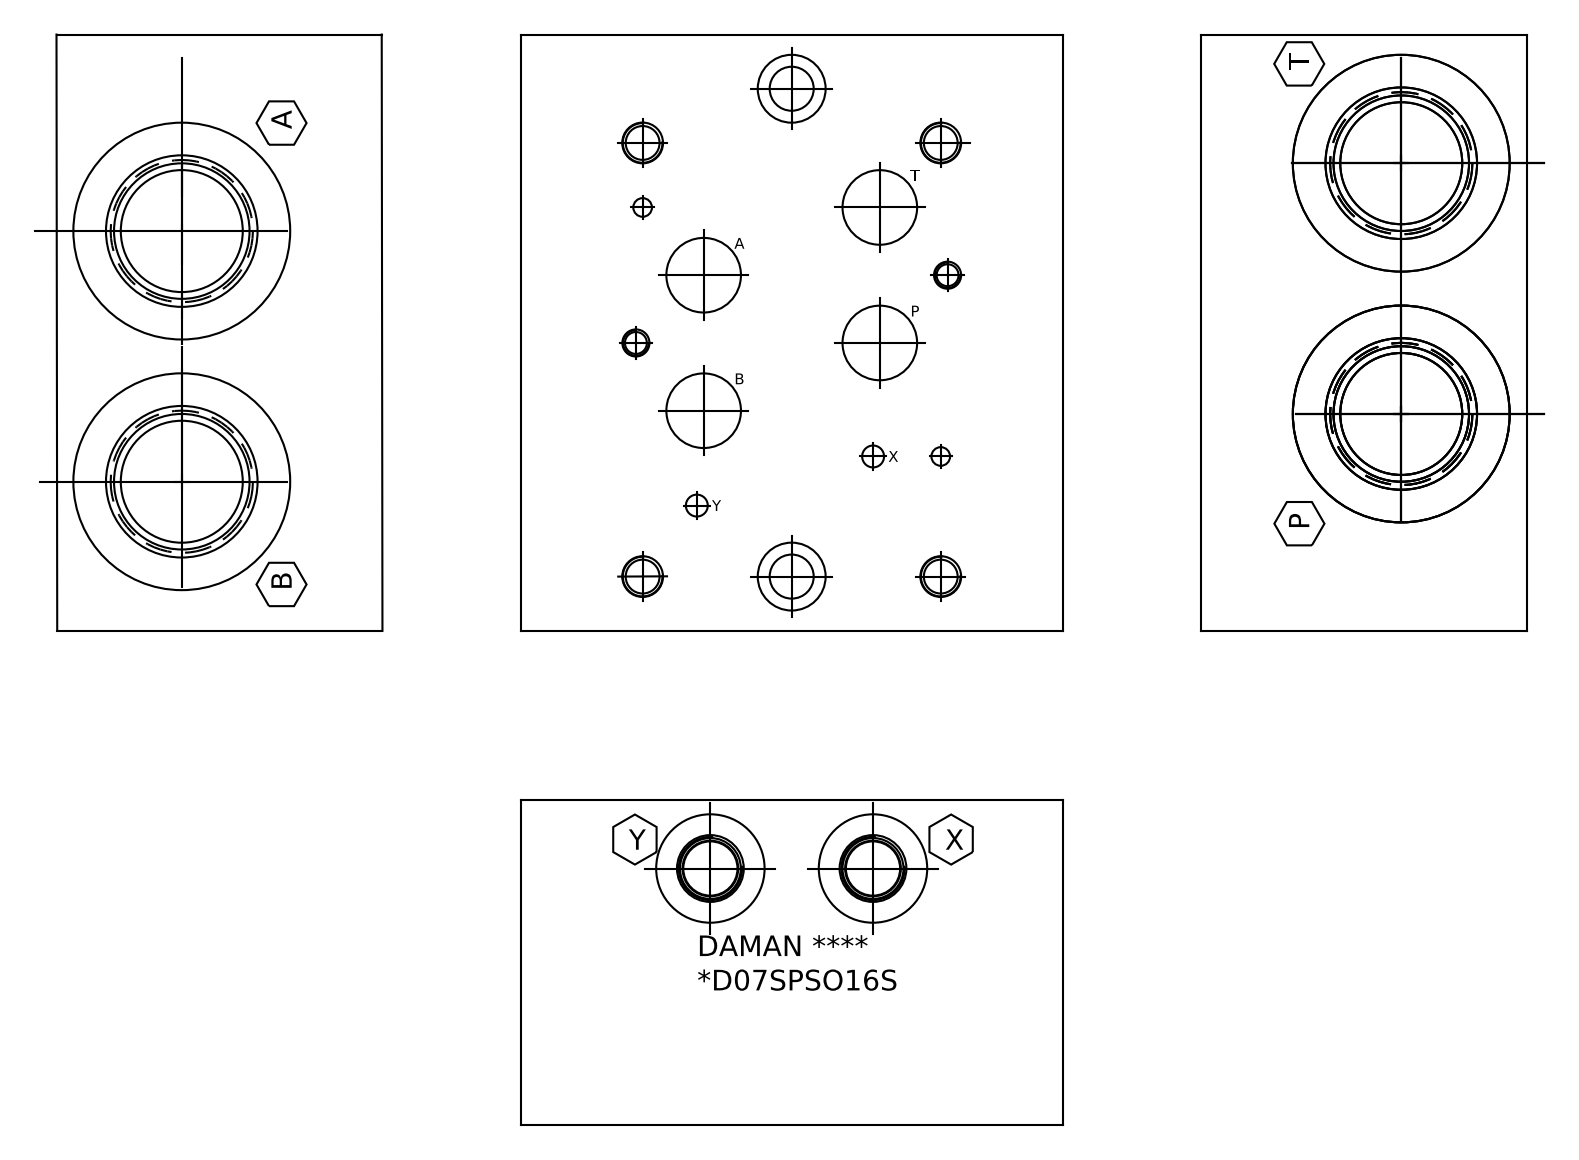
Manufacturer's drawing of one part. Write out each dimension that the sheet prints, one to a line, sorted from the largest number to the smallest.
1.000
